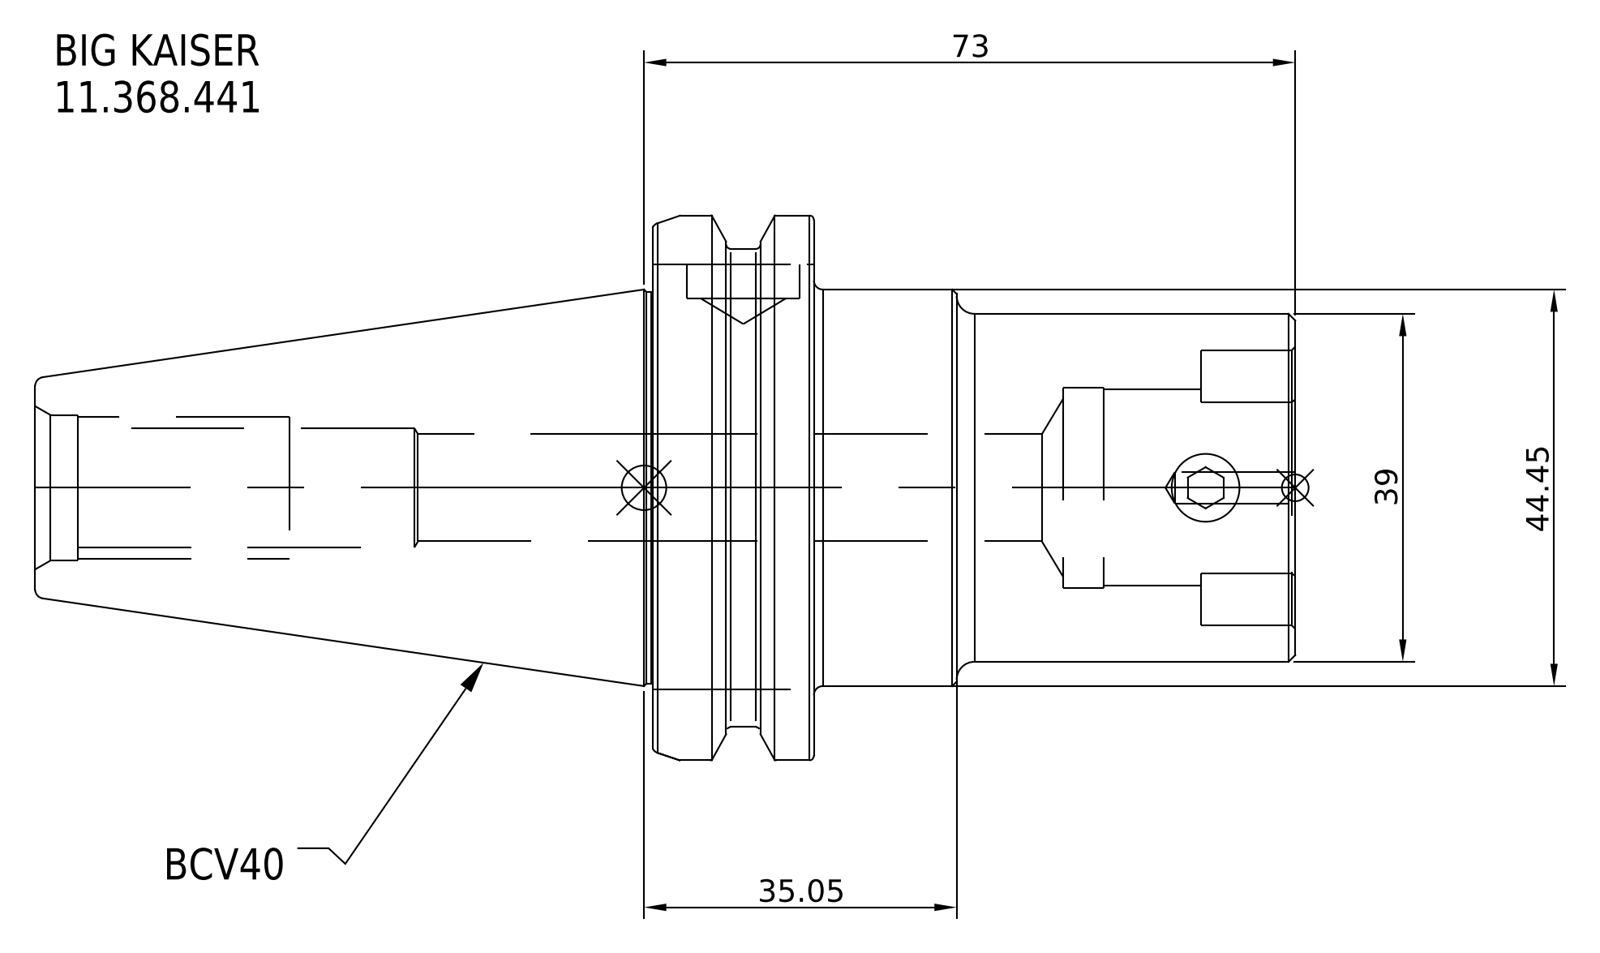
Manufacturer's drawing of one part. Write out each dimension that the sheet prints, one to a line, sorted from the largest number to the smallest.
73
44.45
39
35.05
